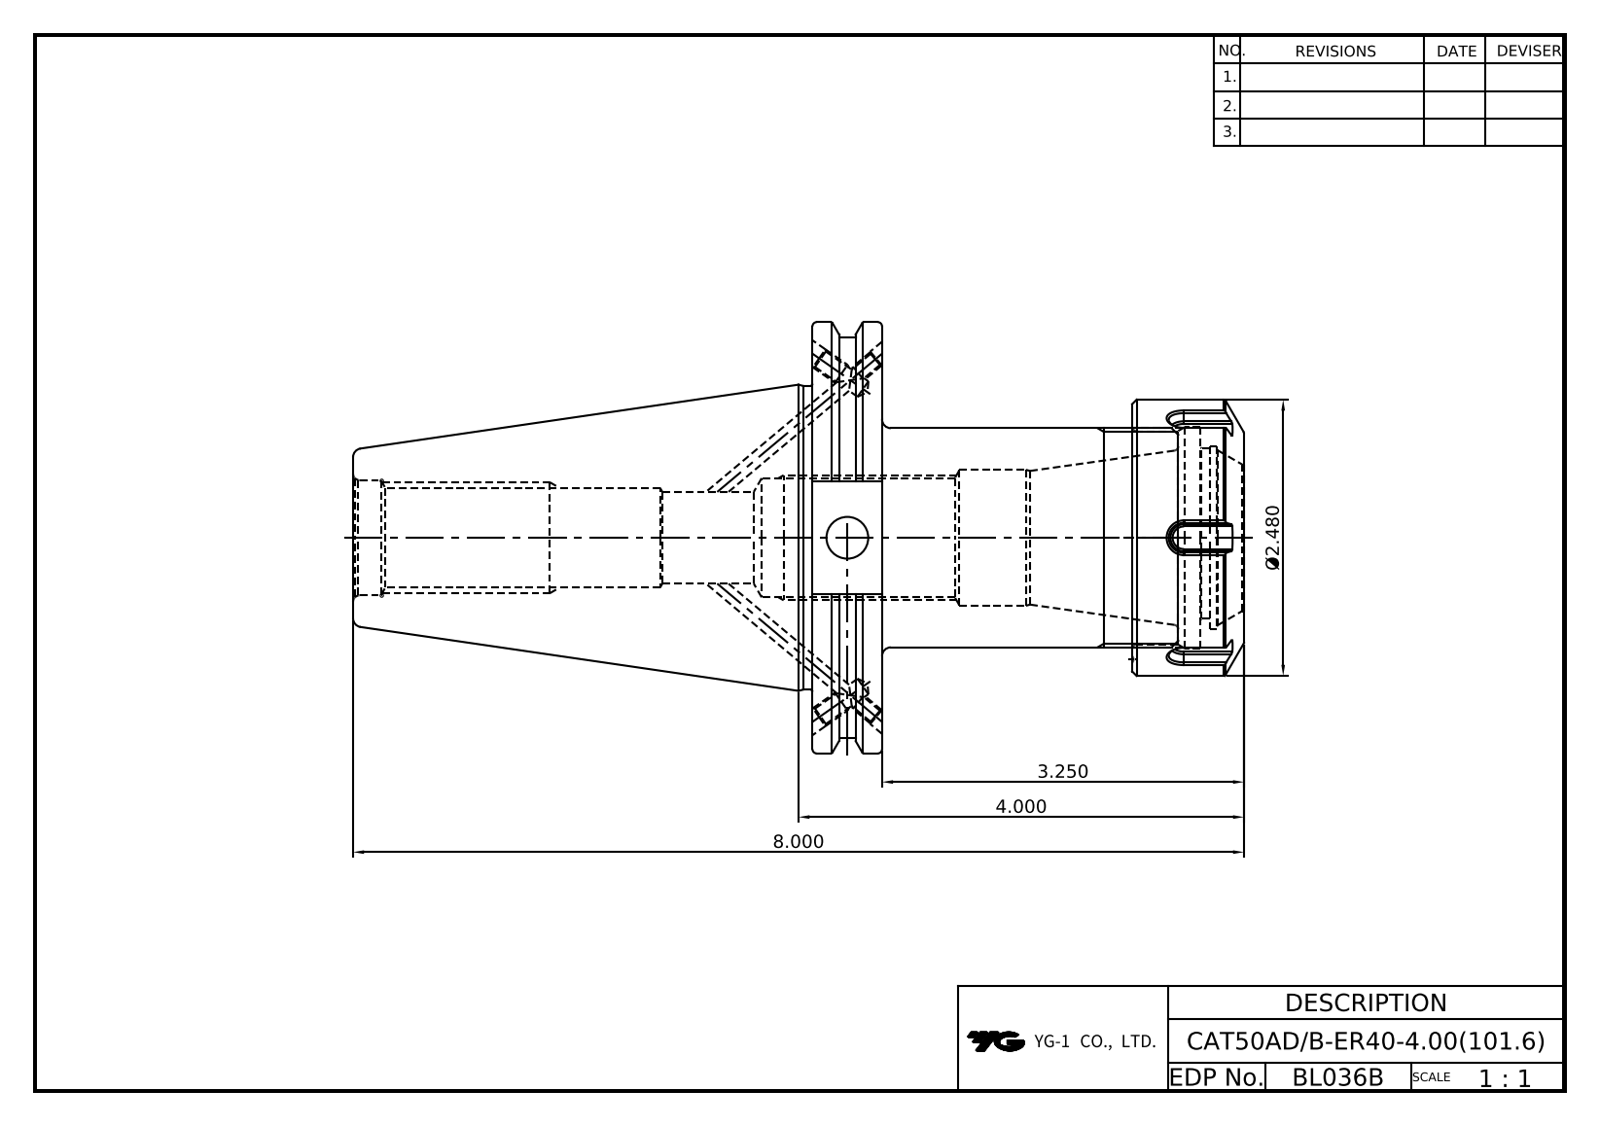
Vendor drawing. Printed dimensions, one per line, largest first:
8.000
4.000
3.250
Ø2.480
